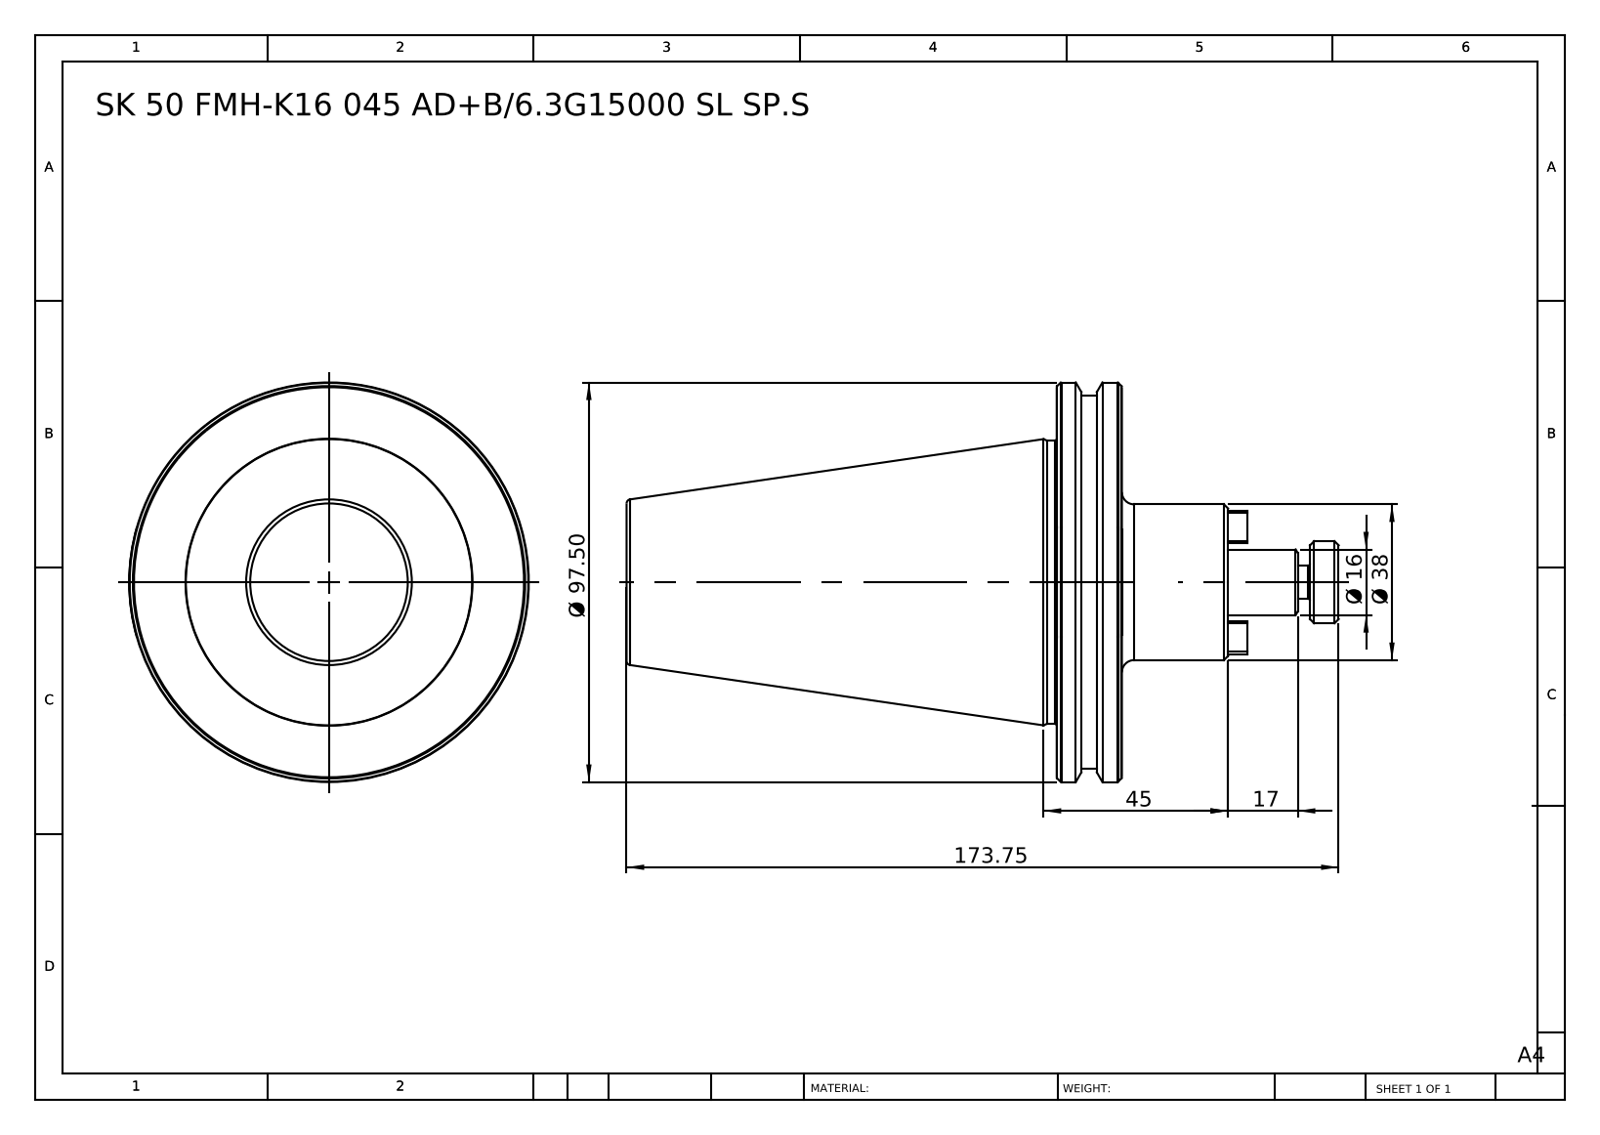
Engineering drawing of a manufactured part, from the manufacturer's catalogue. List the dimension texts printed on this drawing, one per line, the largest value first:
173.75
Ø 97.50
45
Ø 38
17
Ø 16
